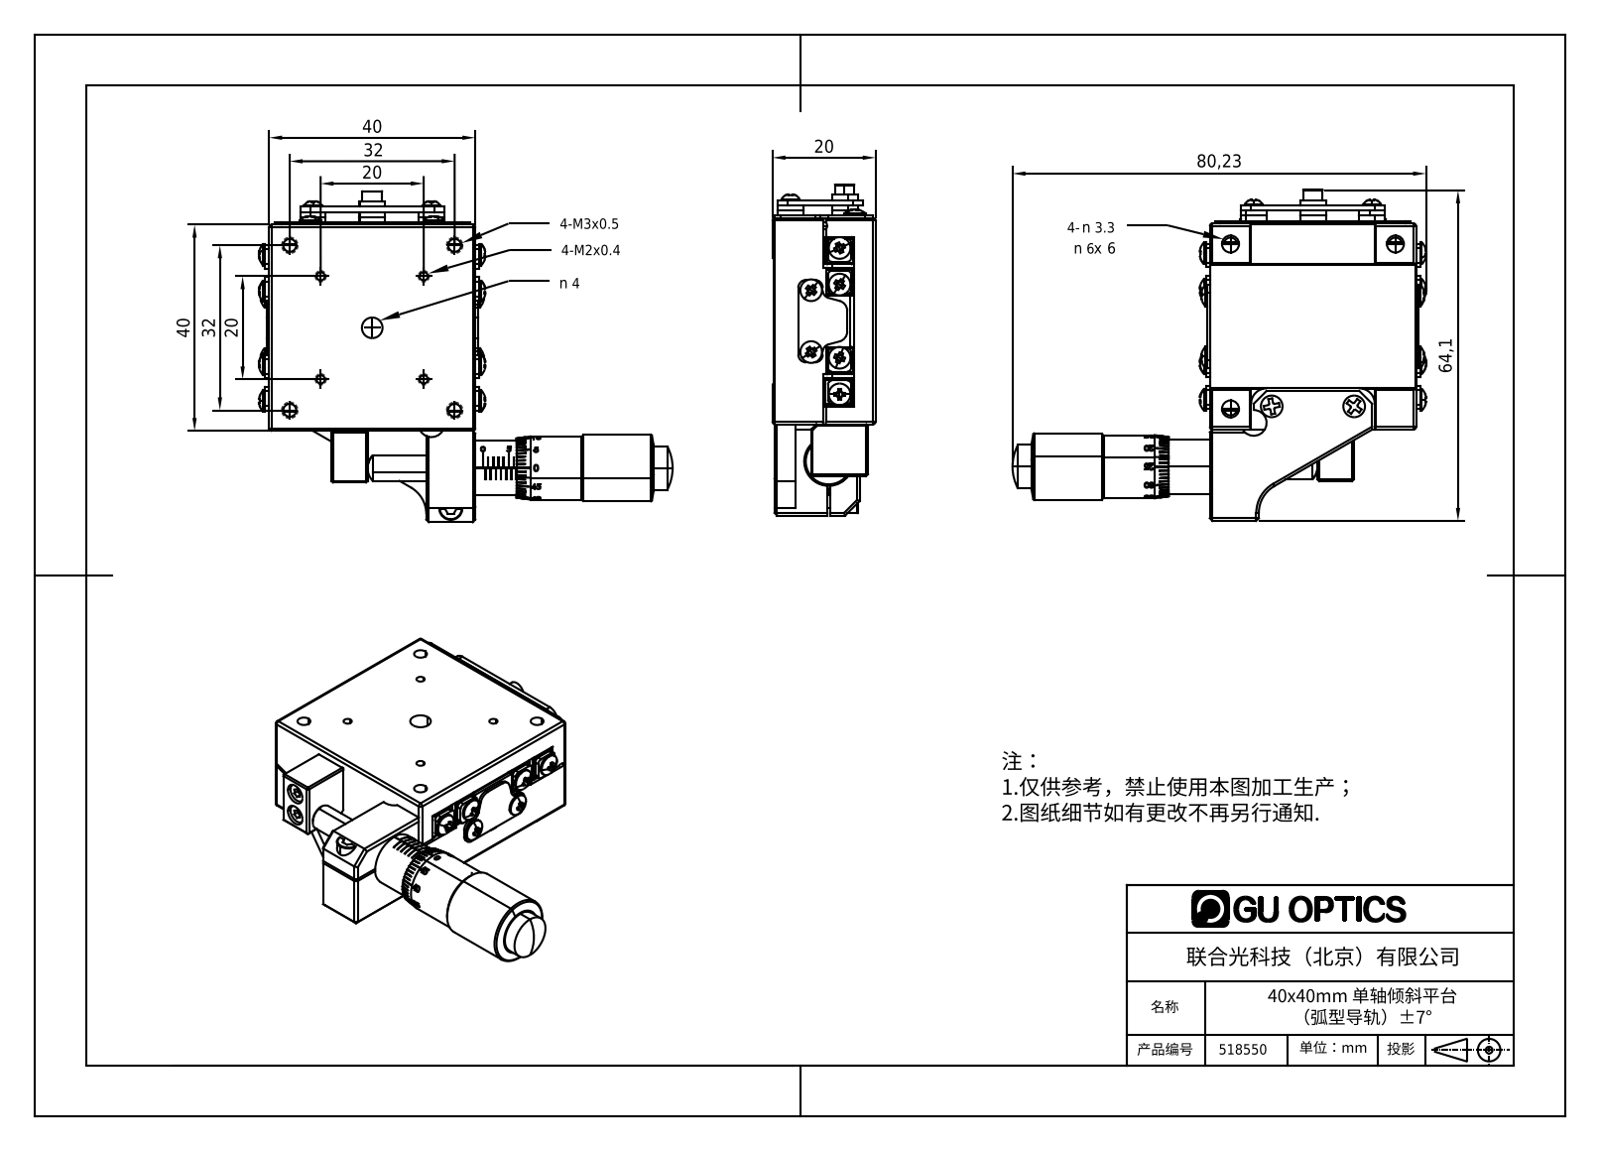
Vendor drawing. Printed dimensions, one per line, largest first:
80,23
64,1
40
40
32
32
20
20
20
